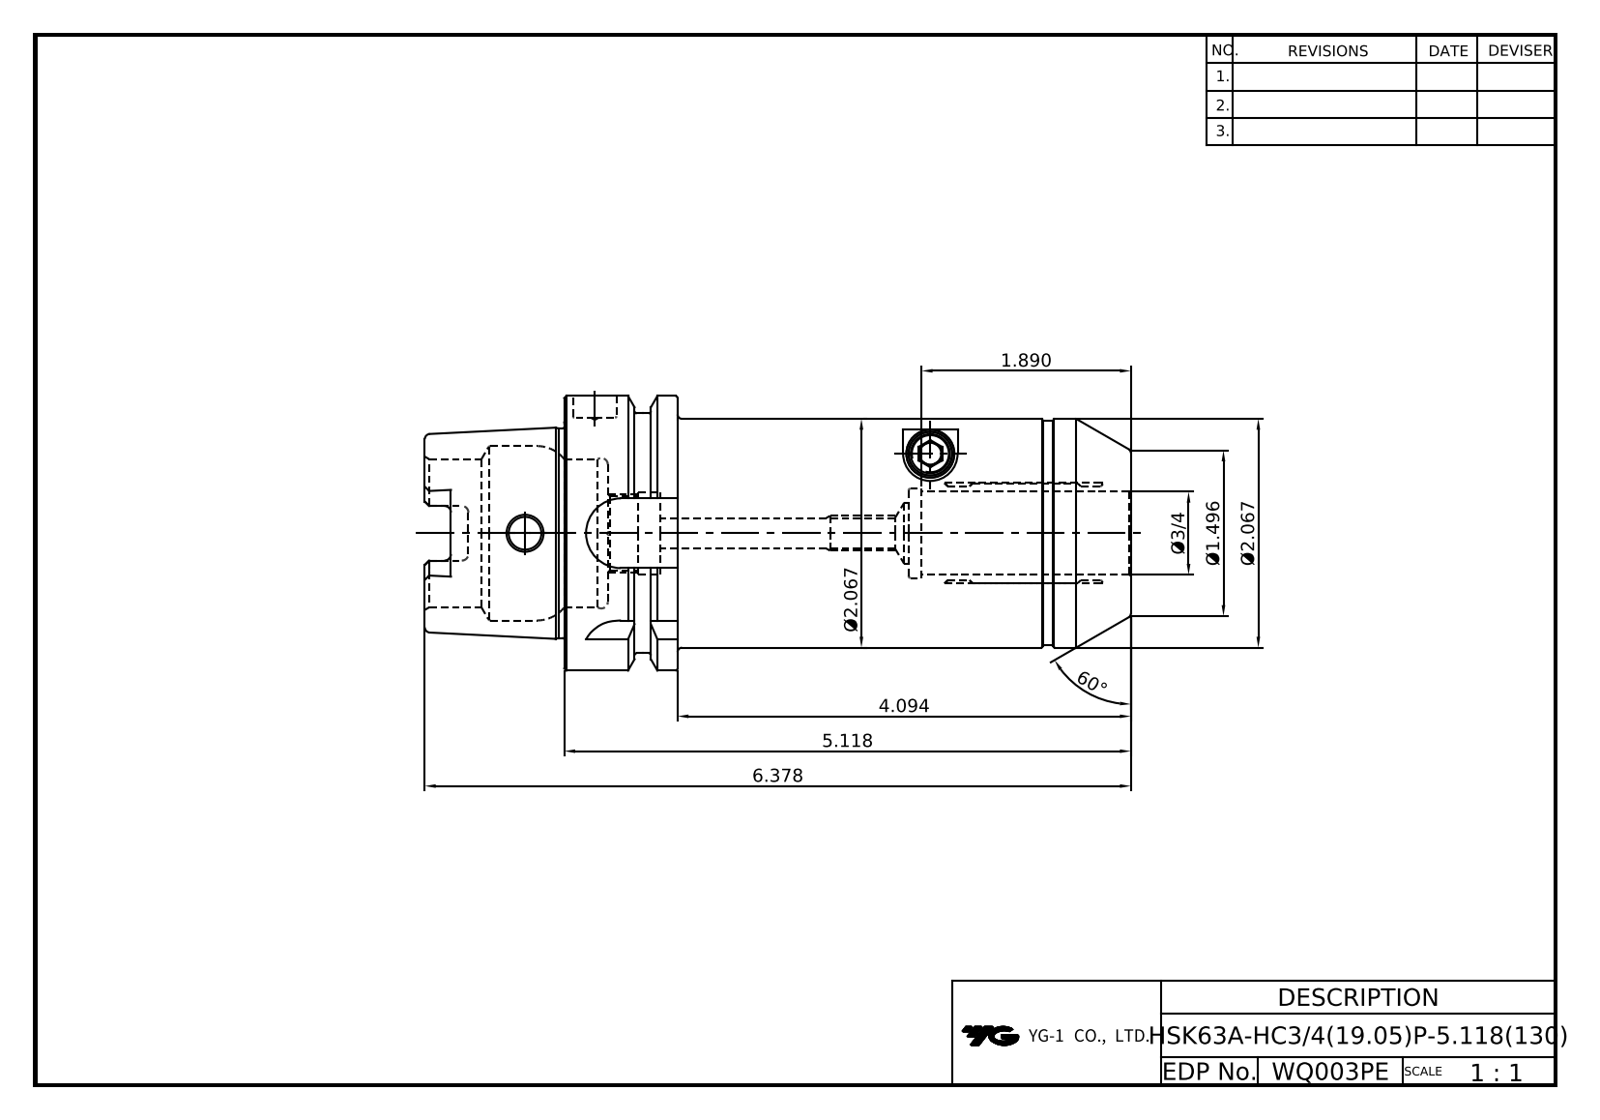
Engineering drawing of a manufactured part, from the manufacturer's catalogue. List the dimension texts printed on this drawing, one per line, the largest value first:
60°
6.378
5.118
4.094
Ø2.067
Ø2.067
1.890
Ø1.496
Ø3/4
